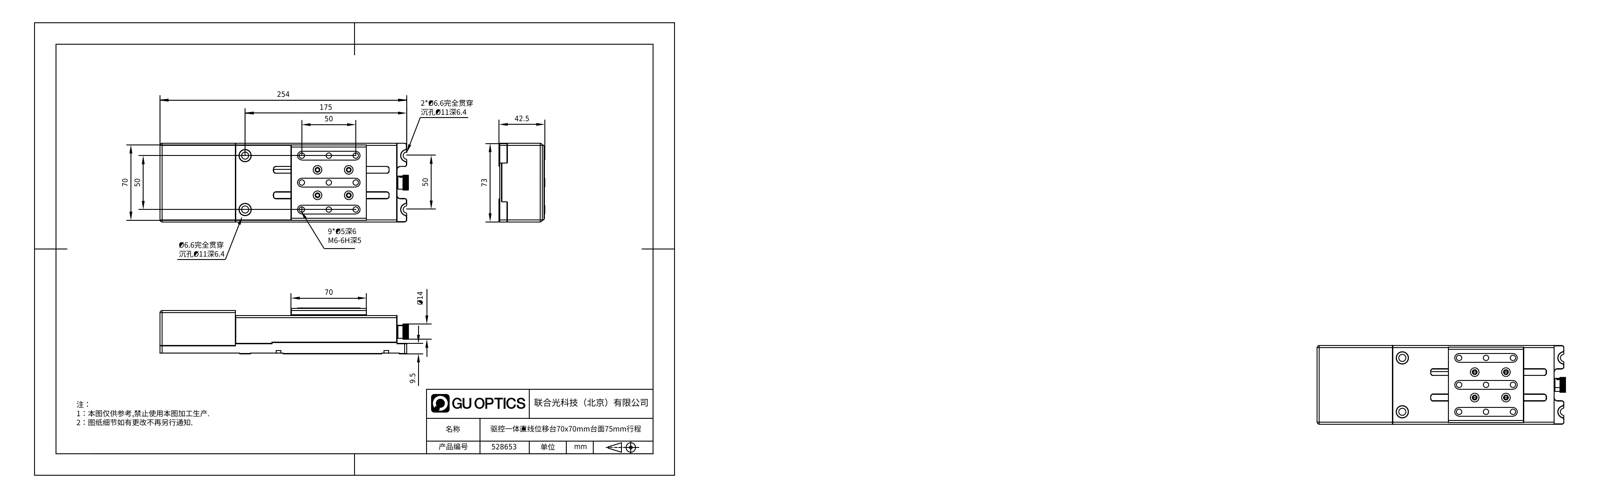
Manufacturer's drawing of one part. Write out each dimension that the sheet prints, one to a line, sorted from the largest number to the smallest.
254
175
73
70
70
50
50
50
42.5
Ø14
9.5
